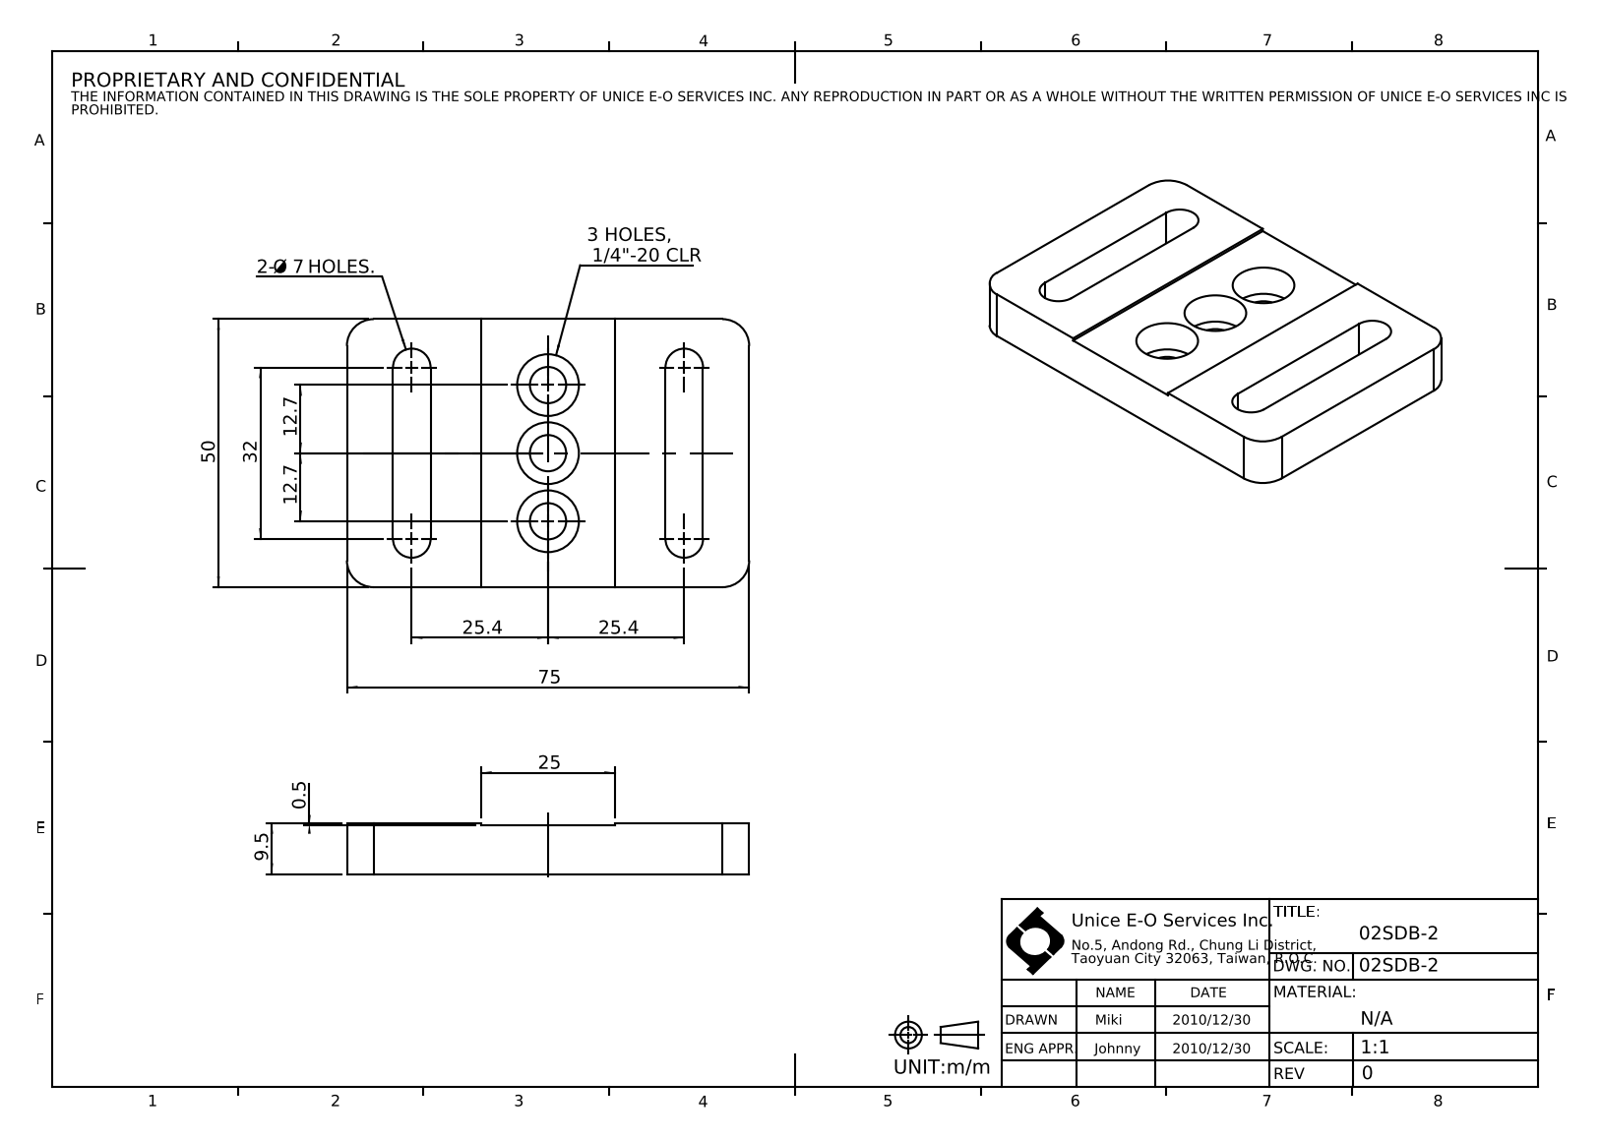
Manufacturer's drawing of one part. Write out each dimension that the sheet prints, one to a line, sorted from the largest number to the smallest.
75
50
32
25.4
25.4
25
12.7
12.7
9.5
2- Ø 7 HOLES.
3 HOLES, 1/4"-20 CLR
0.5
